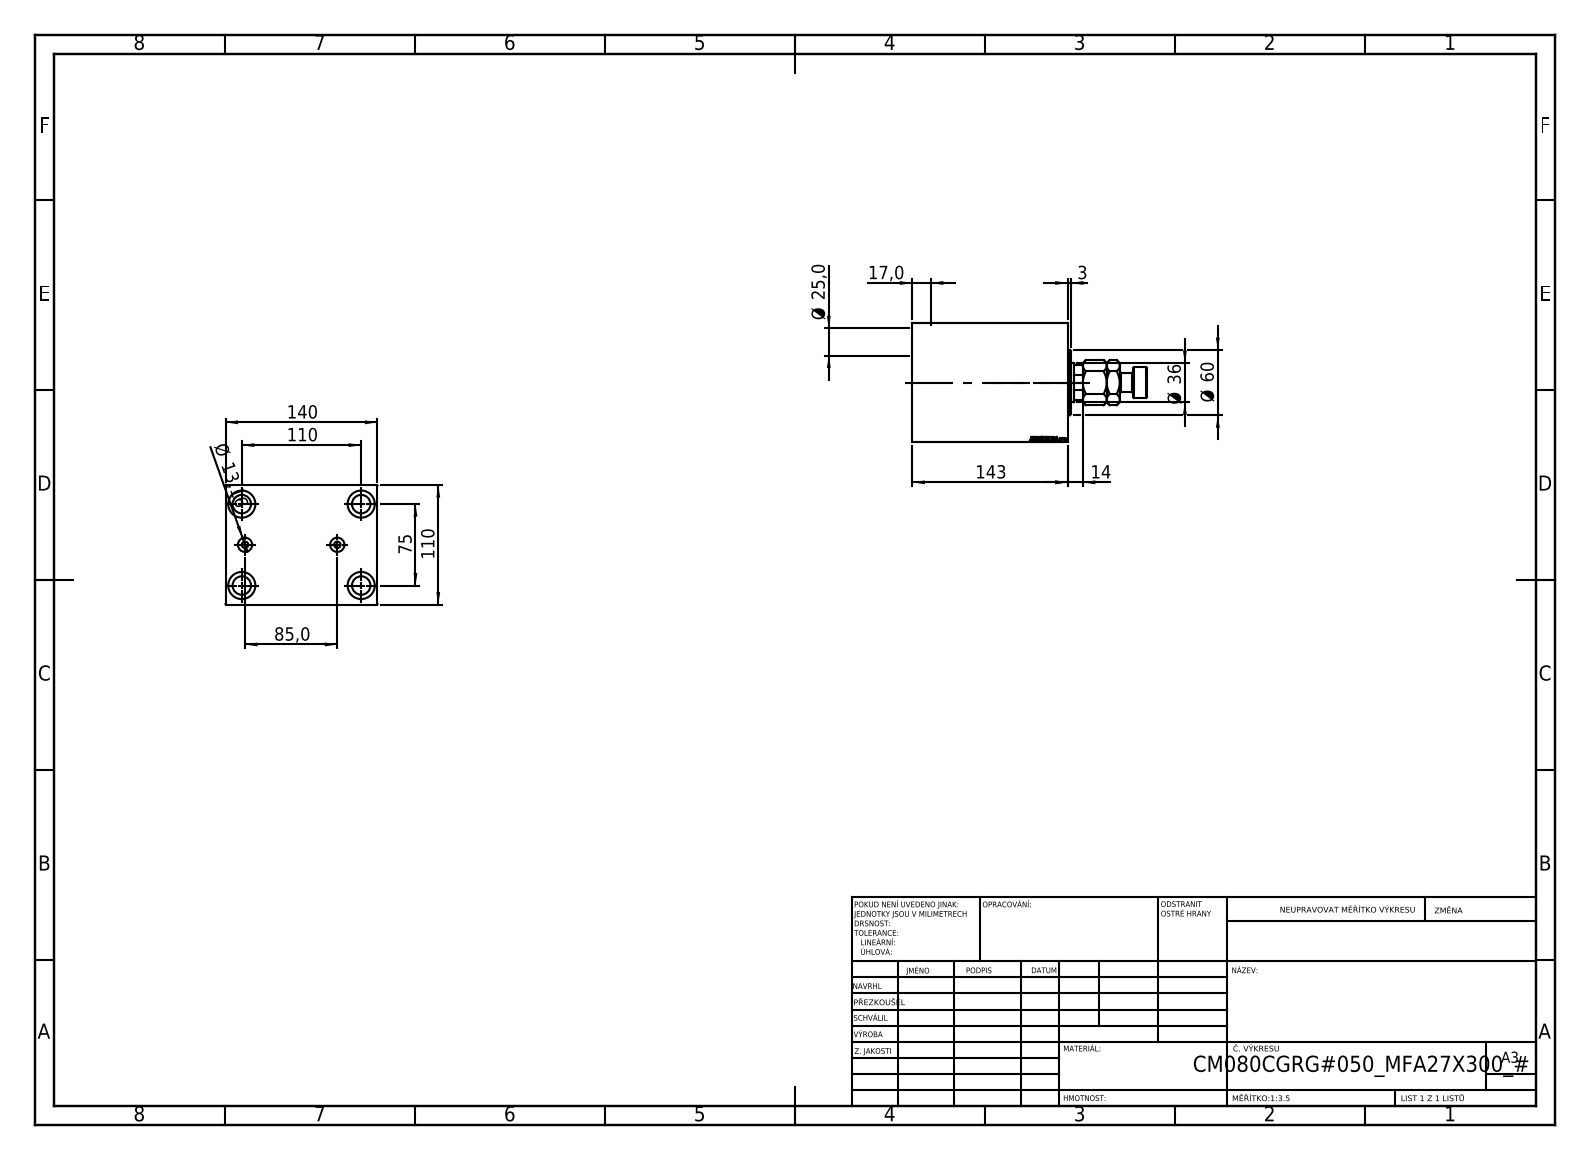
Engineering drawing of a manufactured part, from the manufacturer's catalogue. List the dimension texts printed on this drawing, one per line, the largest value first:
143
140
110
110
85,0
75
Ø 60
Ø 36
Ø 25,0
17,0
14
Ø 13,16
3
